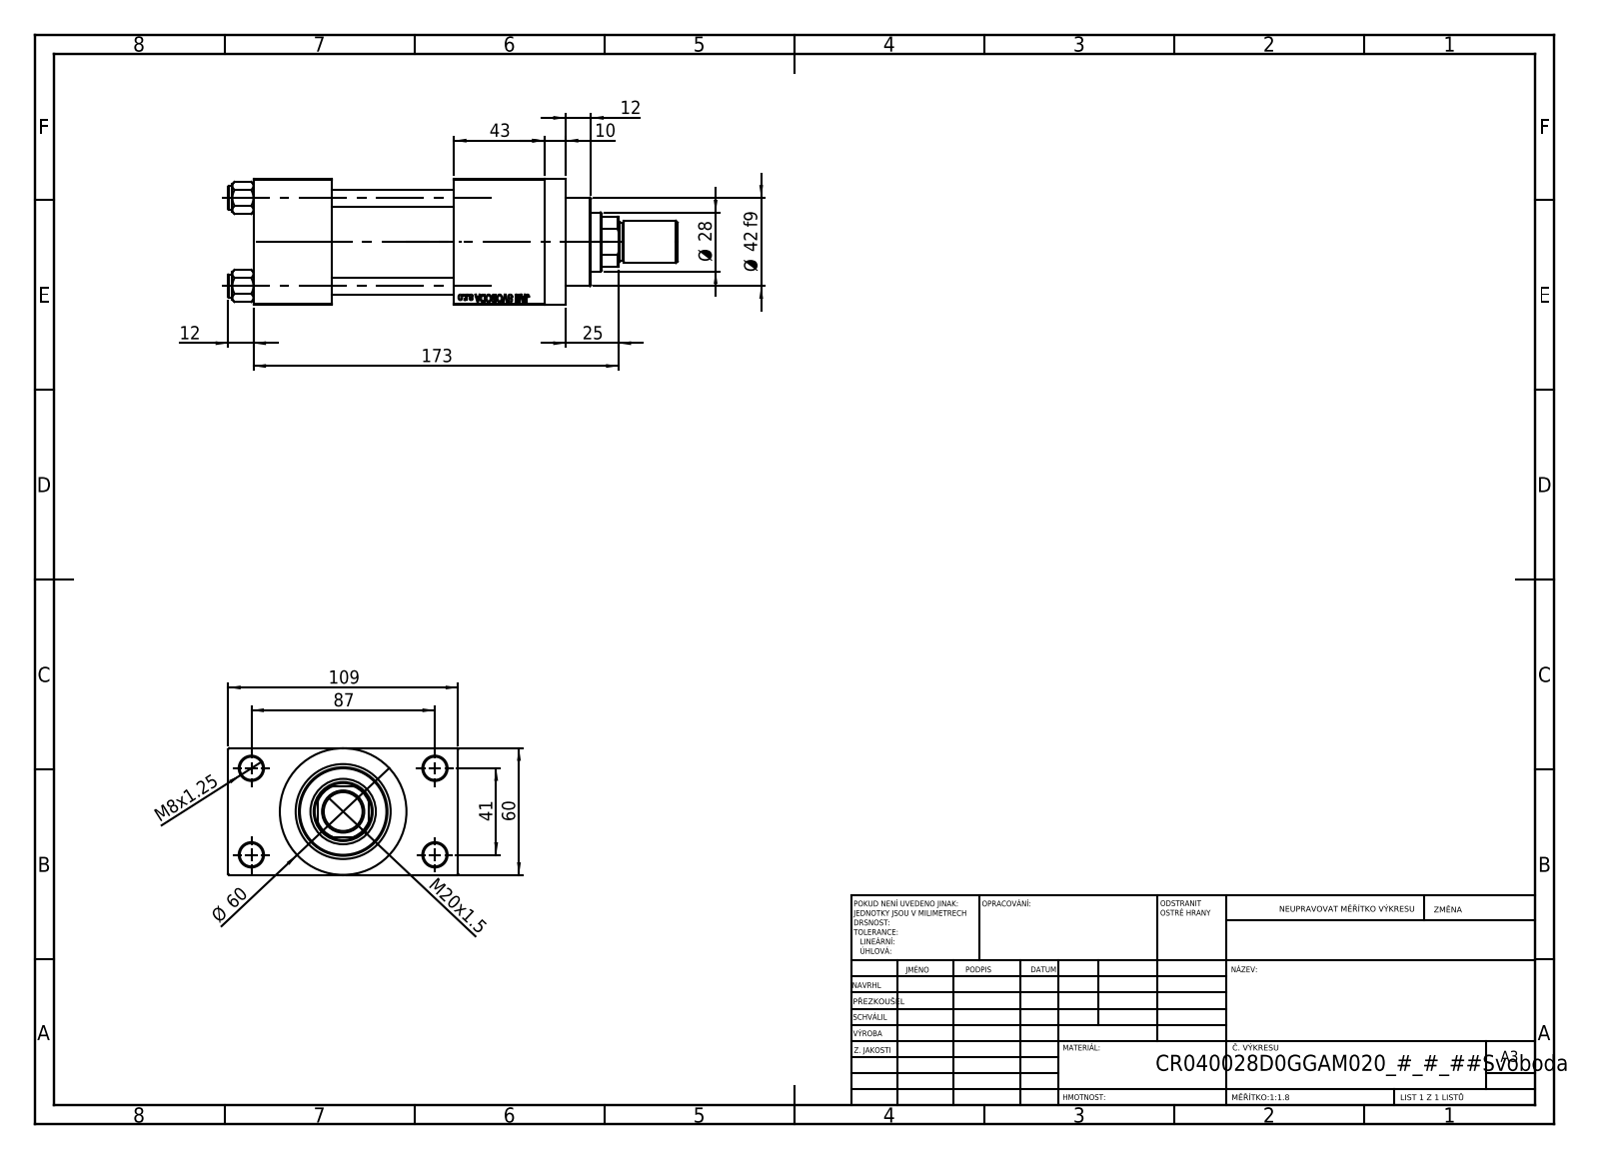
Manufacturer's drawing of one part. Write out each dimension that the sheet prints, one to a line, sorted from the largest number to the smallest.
173
109
87
Ø 60
60
43
Ø 42 f9
41
Ø 28
25
M20x1.5
12
12
10
M8x1.25
